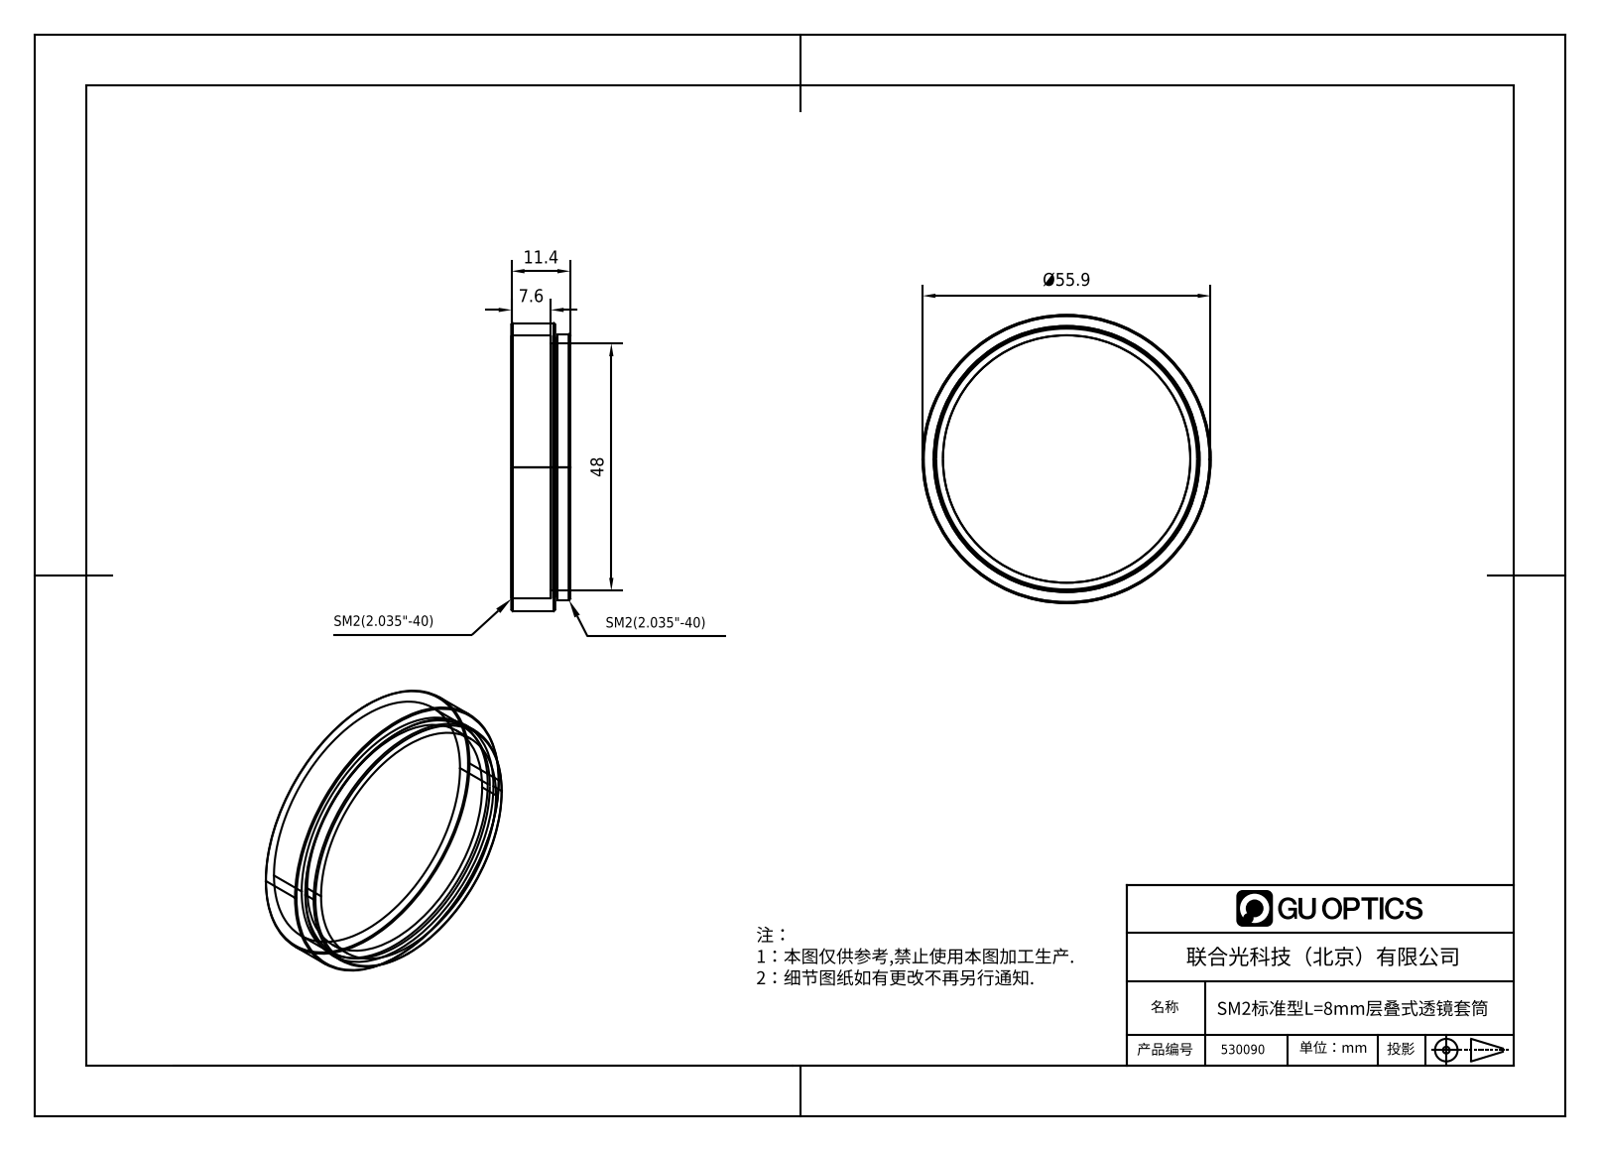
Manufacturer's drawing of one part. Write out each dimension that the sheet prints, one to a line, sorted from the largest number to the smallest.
Ø55.9
48
11.4
7.6
